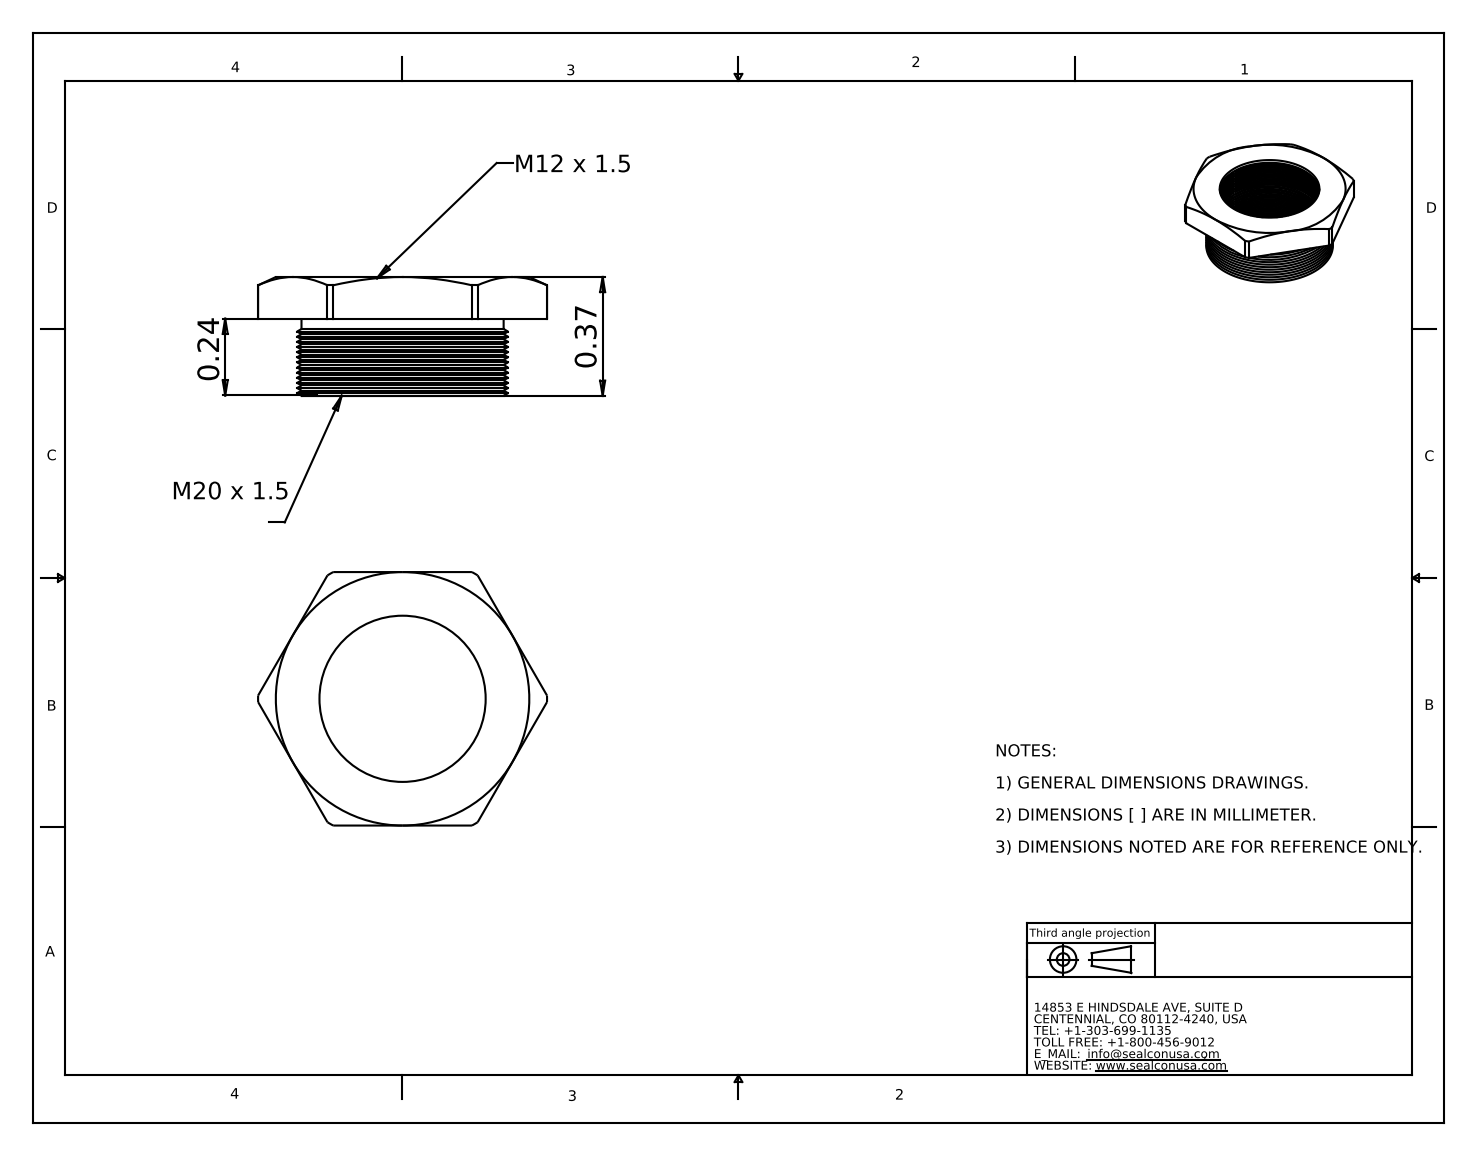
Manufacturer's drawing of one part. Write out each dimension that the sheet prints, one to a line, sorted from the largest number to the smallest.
0.37
0.24
